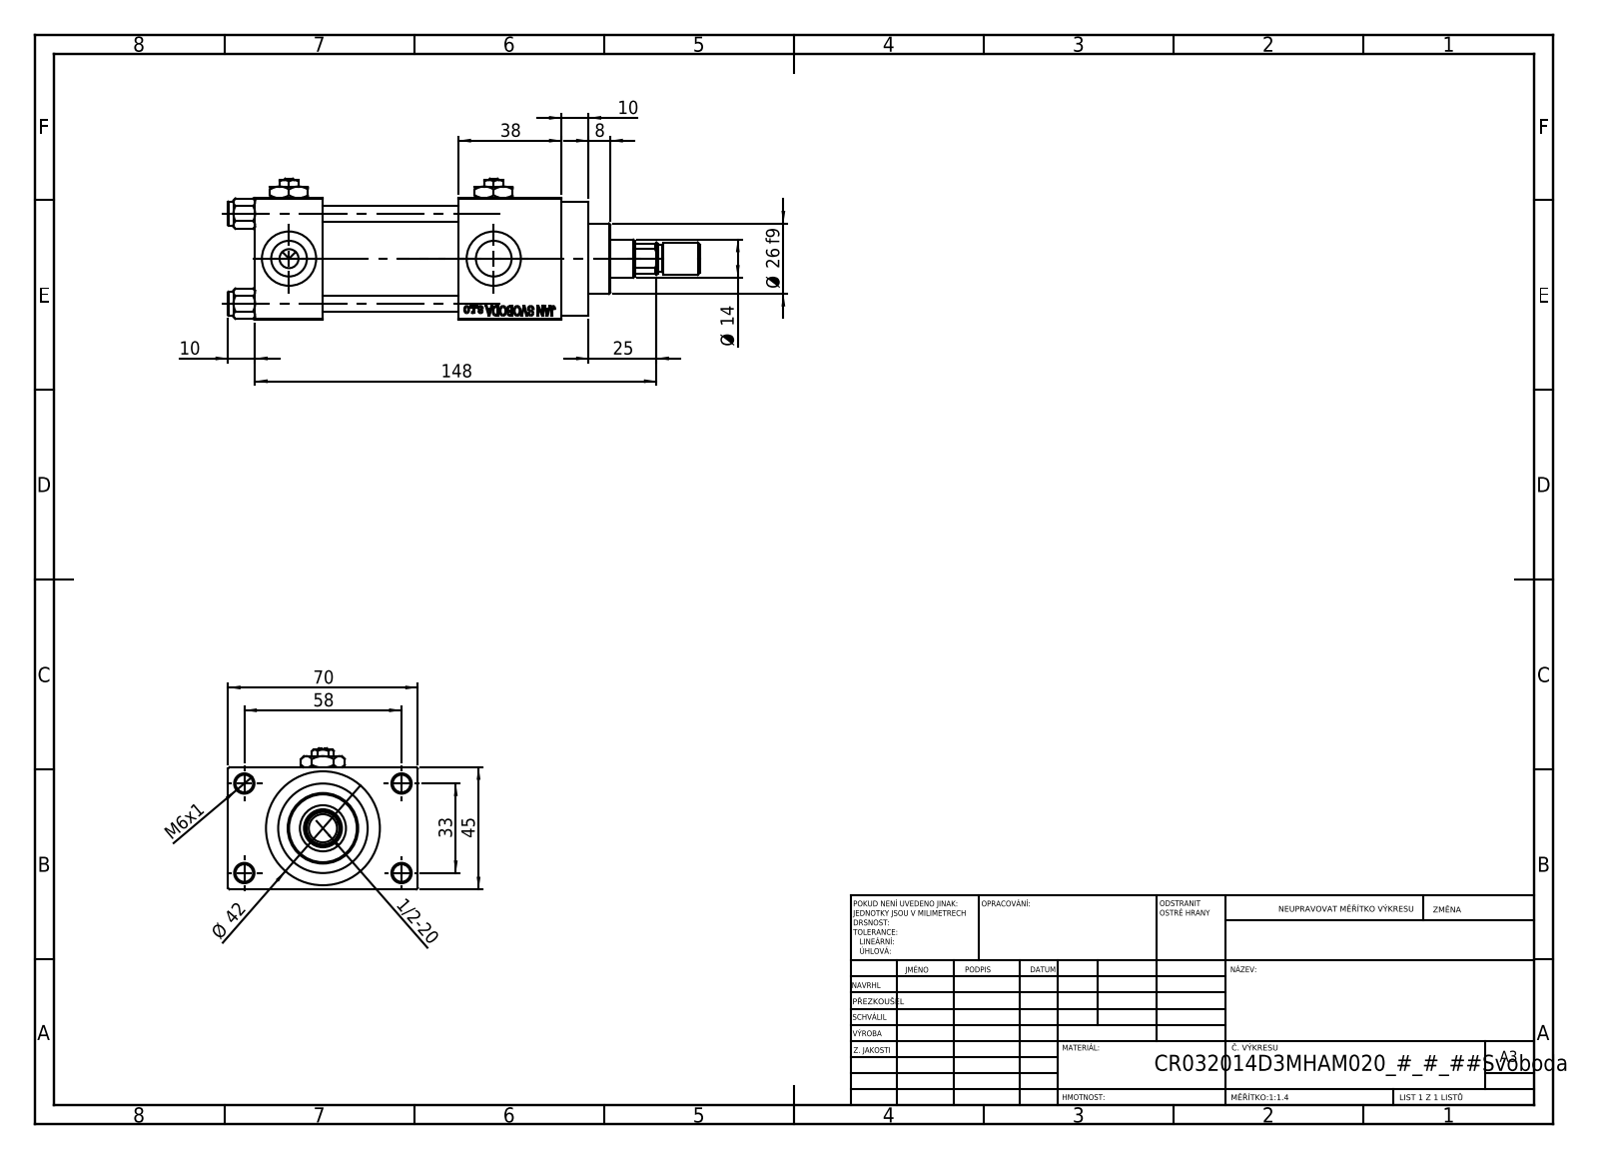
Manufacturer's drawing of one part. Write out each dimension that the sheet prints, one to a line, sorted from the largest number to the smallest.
148
70
58
45
Ø 42
38
33
Ø 26 f9
25
Ø 14
10
10
8
M6x1
1/2-20
